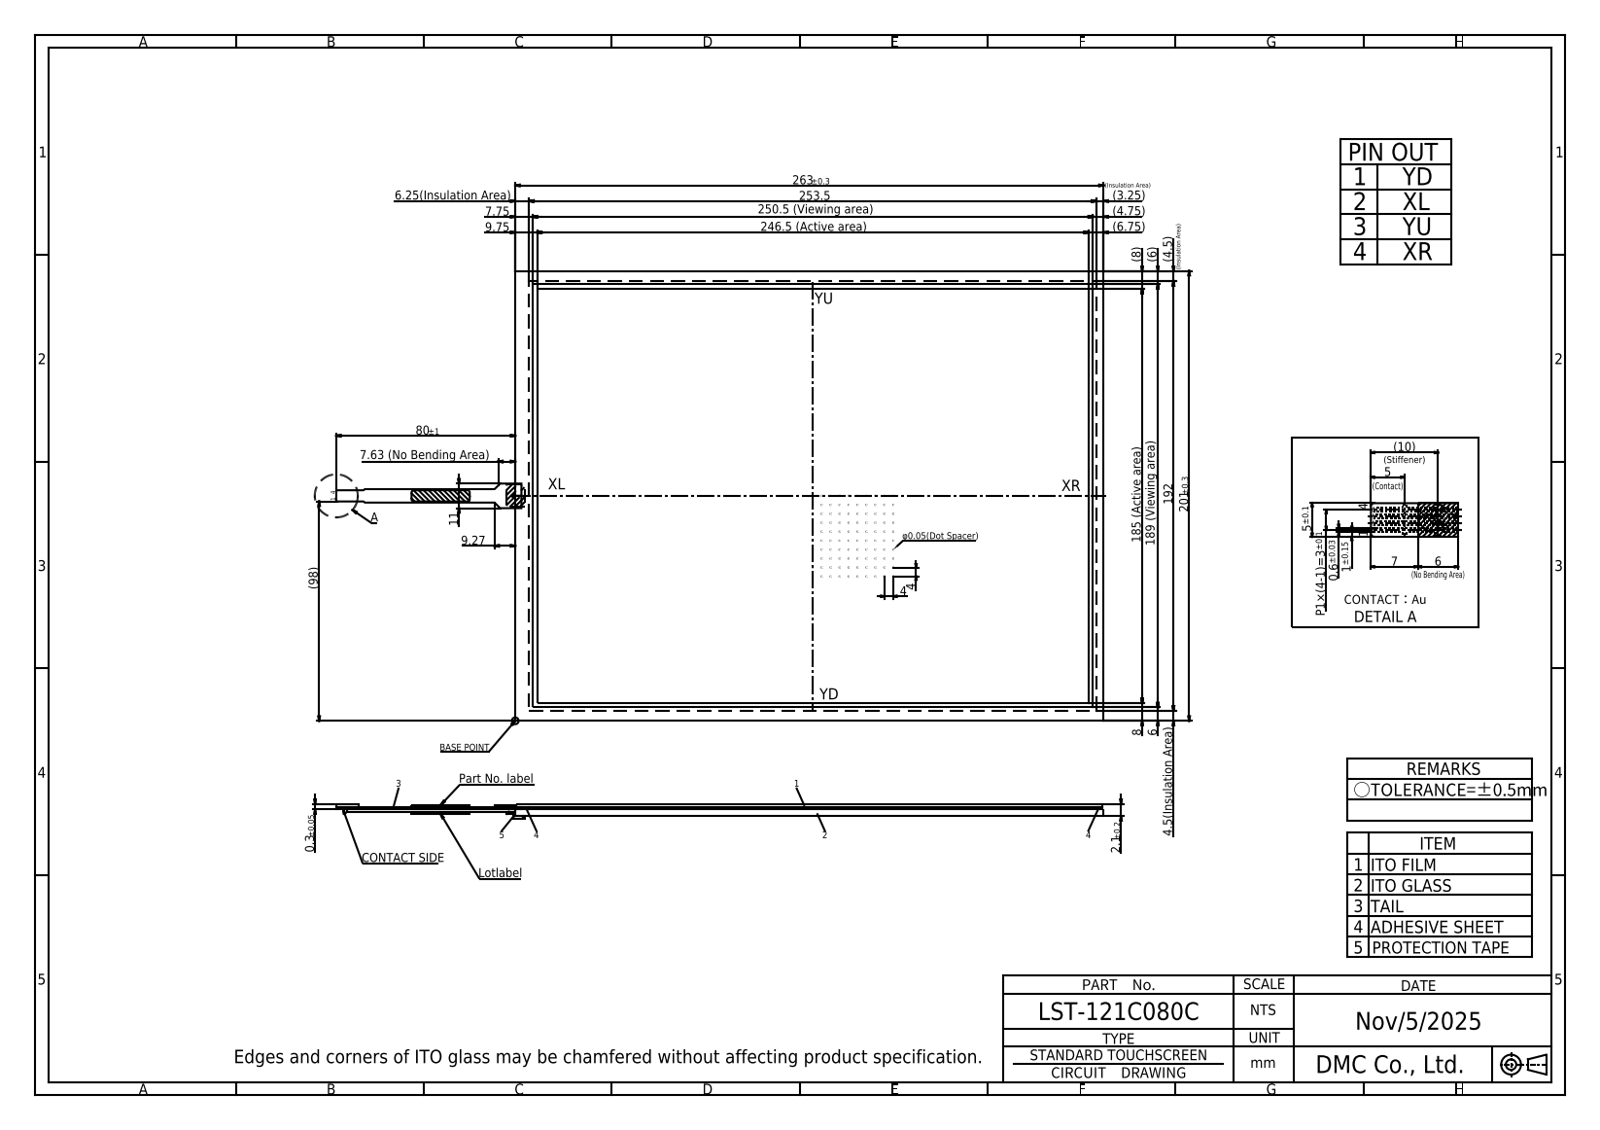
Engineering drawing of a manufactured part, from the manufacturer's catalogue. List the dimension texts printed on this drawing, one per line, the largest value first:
253.5
250.5 (Viewing area)
246.5 (Active area)
192
189 (Viewing area)
185 (Active area)
(98)
11
(10)
9.75
9.27
8
(8)
7.75
7.63 (No Bending Area)
7
(6.75)
6.25(Insulation Area)
6
(6)
6
5
5±0.1
(4.75)
4.5(Insulation Area)
(4.5)
4
4
(3.25)
P1×(4-1)=3±0.1
1±0.15
0.6±0.03
